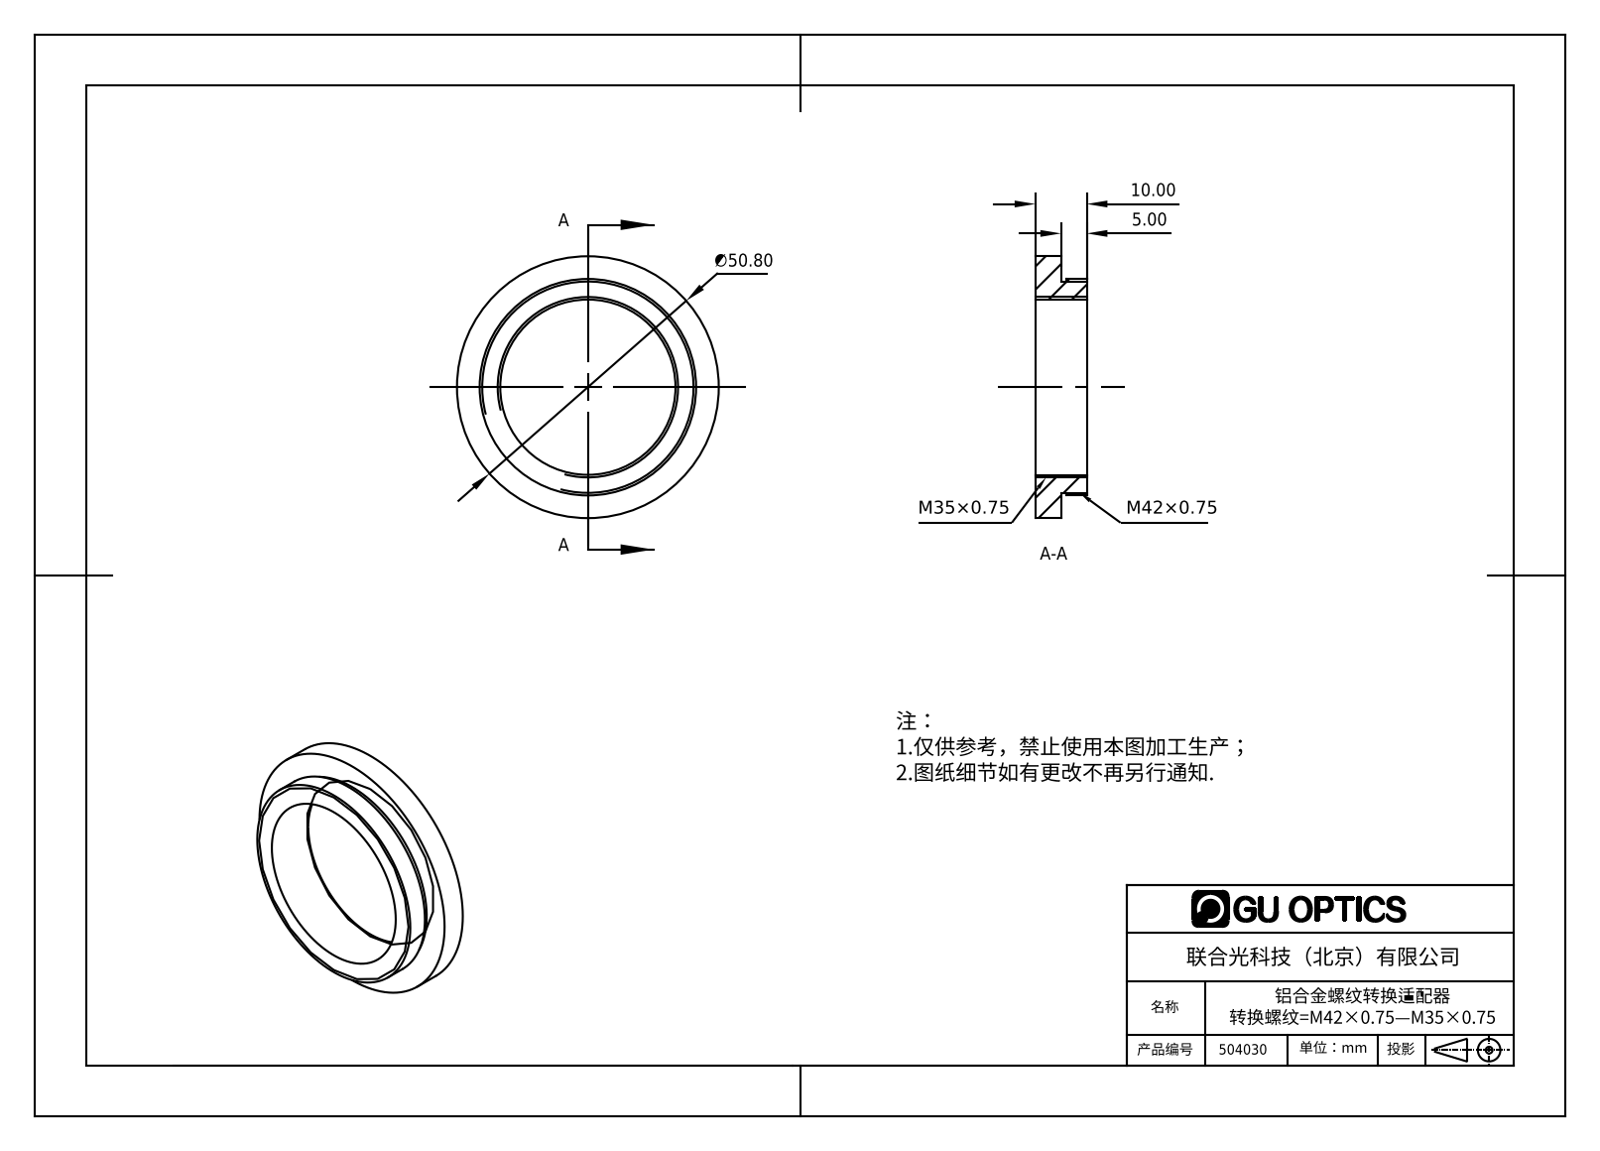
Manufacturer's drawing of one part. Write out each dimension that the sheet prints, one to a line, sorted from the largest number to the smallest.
∅50.80
10.00
5.00
